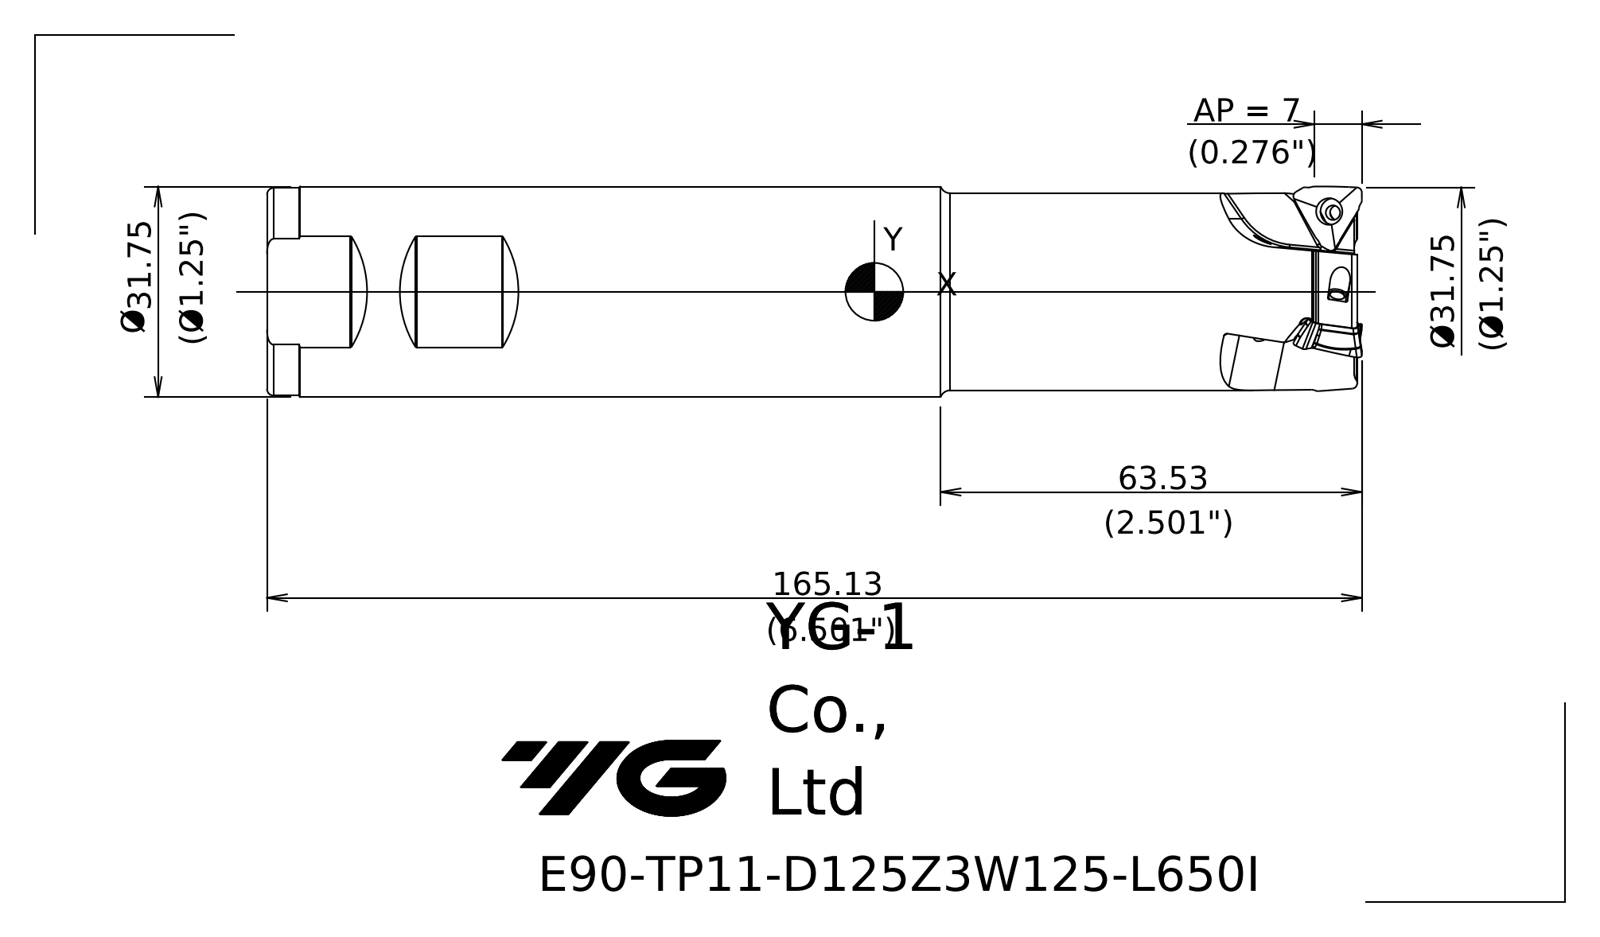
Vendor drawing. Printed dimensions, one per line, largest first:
165.13
63.53
Ø31.75
Ø 31.75
AP = 7
